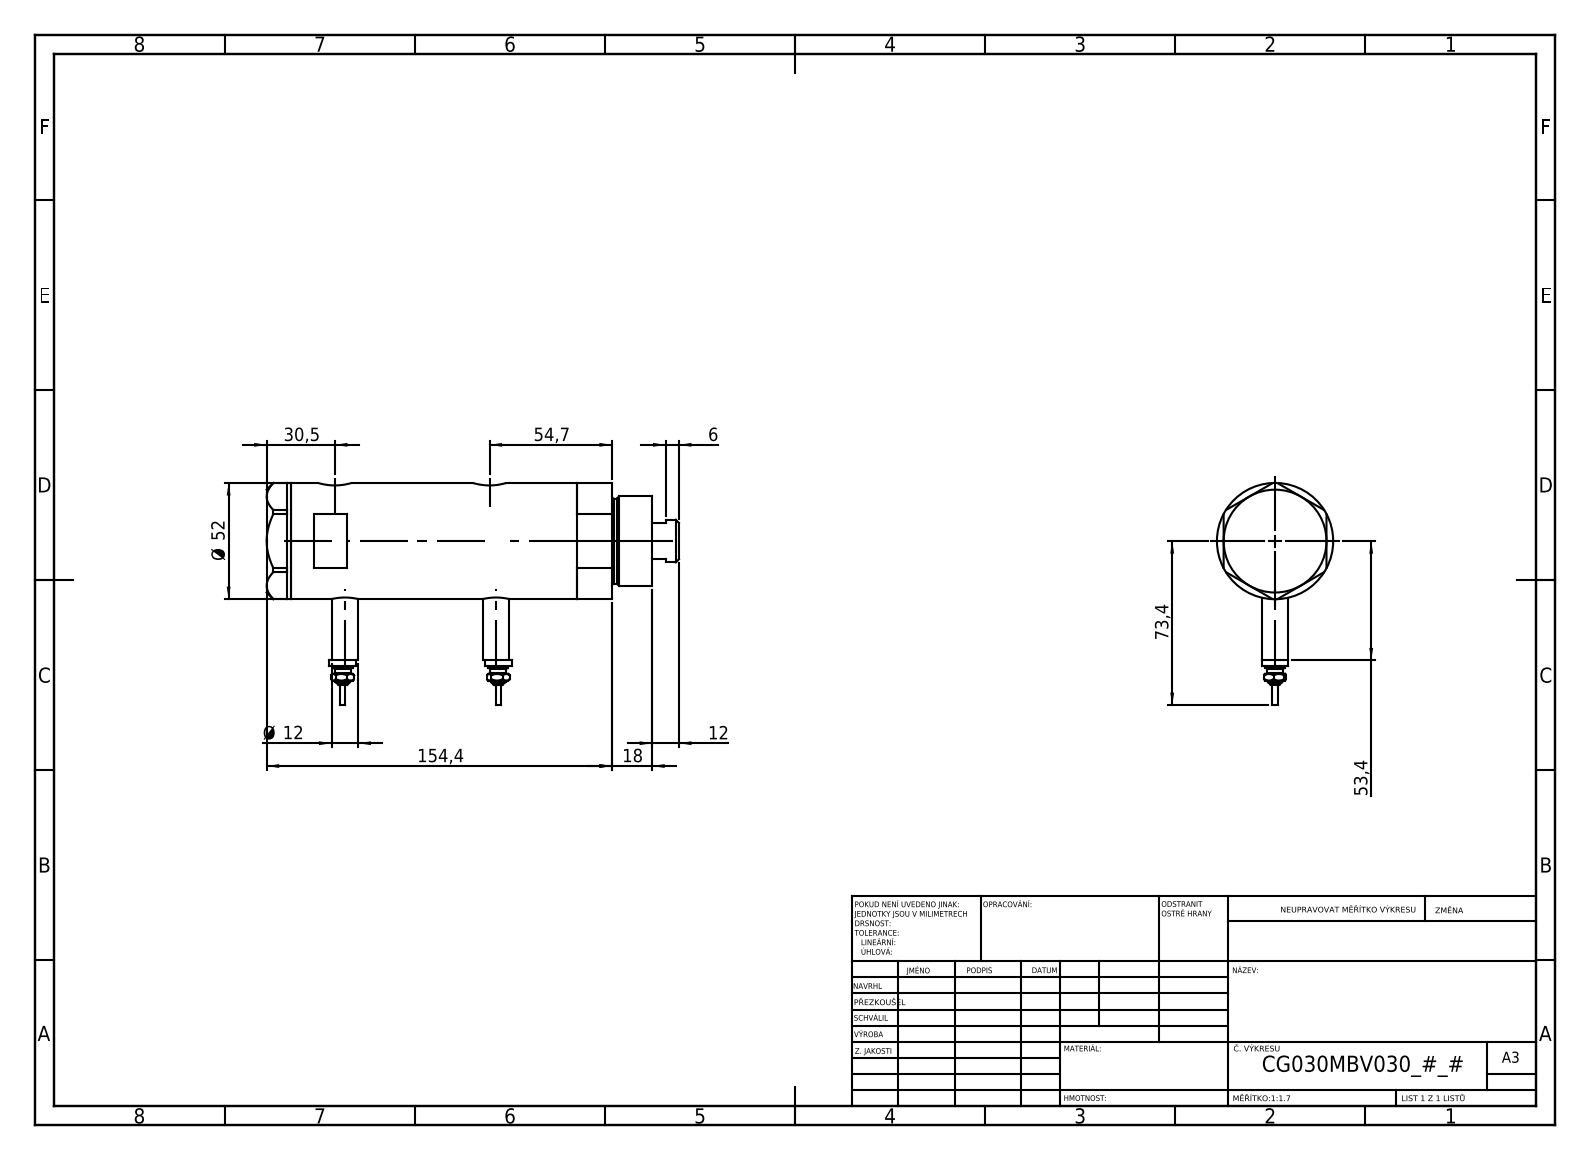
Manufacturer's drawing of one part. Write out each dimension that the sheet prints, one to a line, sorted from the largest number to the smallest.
154,4
73,4
54,7
53,4
Ø 52
30,5
18
12
Ø 12
6
